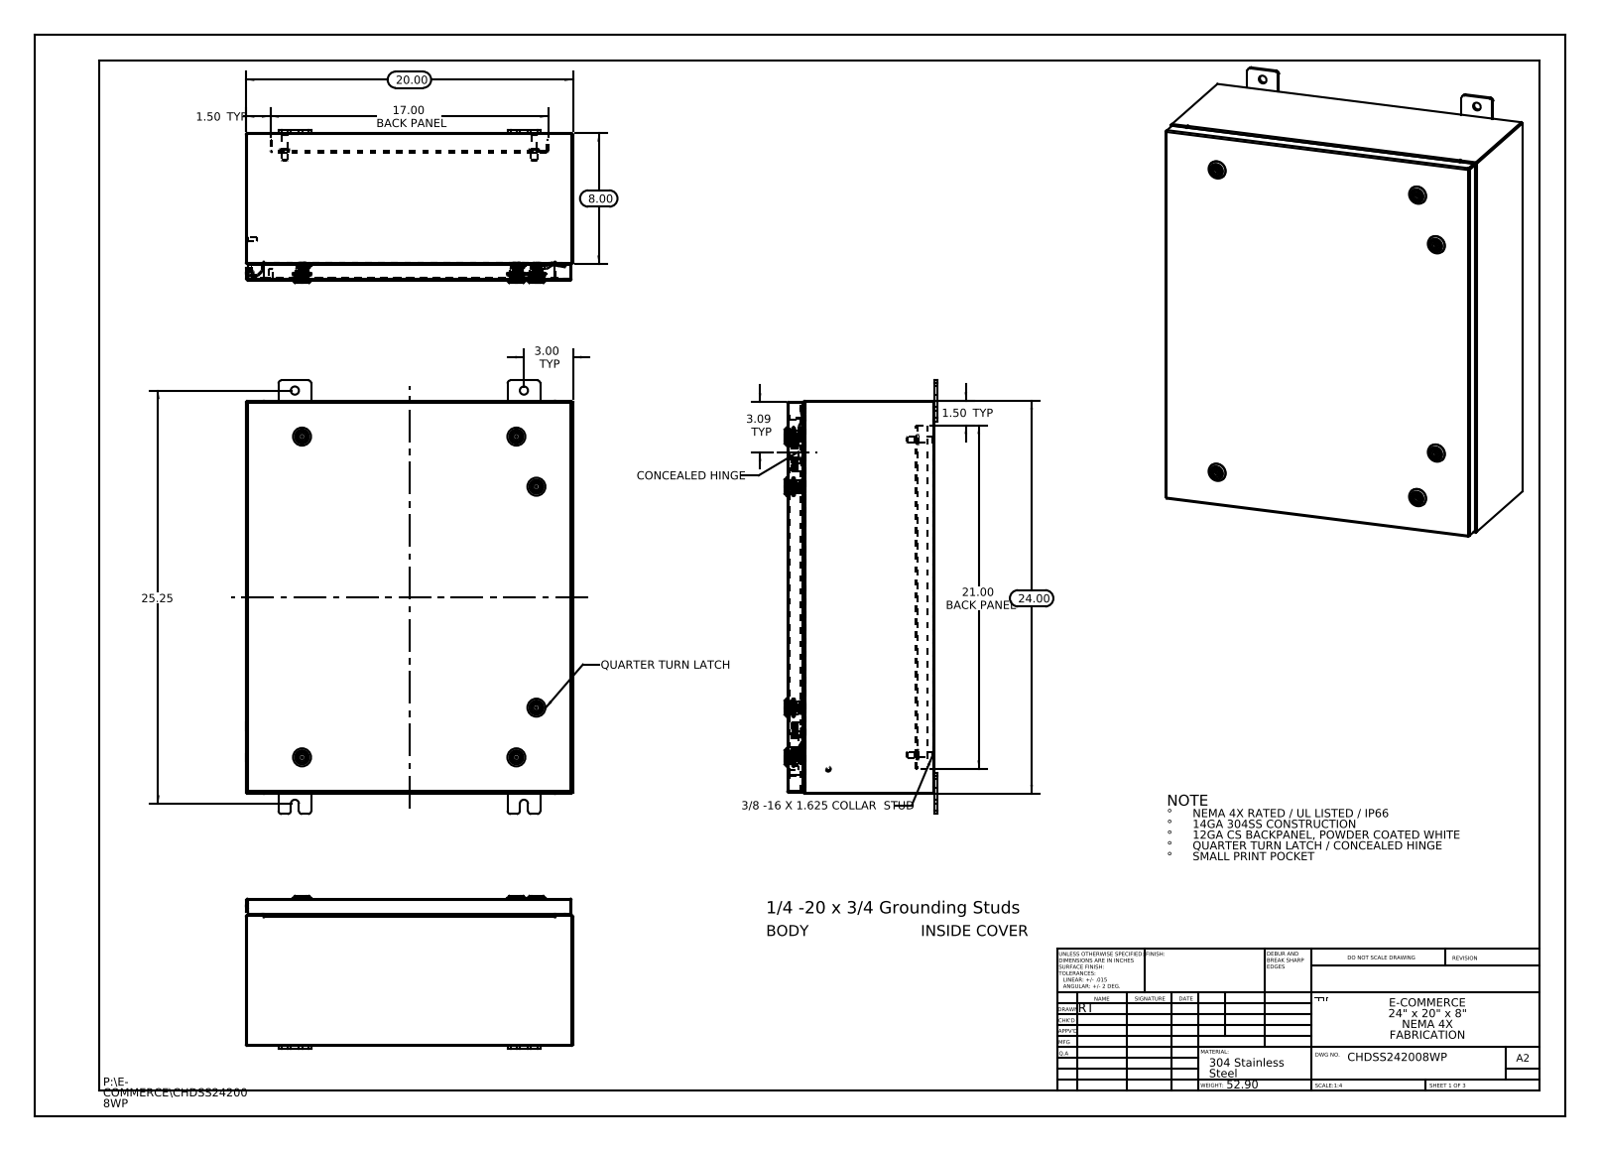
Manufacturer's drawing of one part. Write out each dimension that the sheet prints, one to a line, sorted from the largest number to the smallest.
25.25
24.00
21.00 BACK PANEL
20.00
17.00 BACK PANEL
8.00
3.09 TYP
3.00 TYP
1.50 TYP
1.50 TYP
